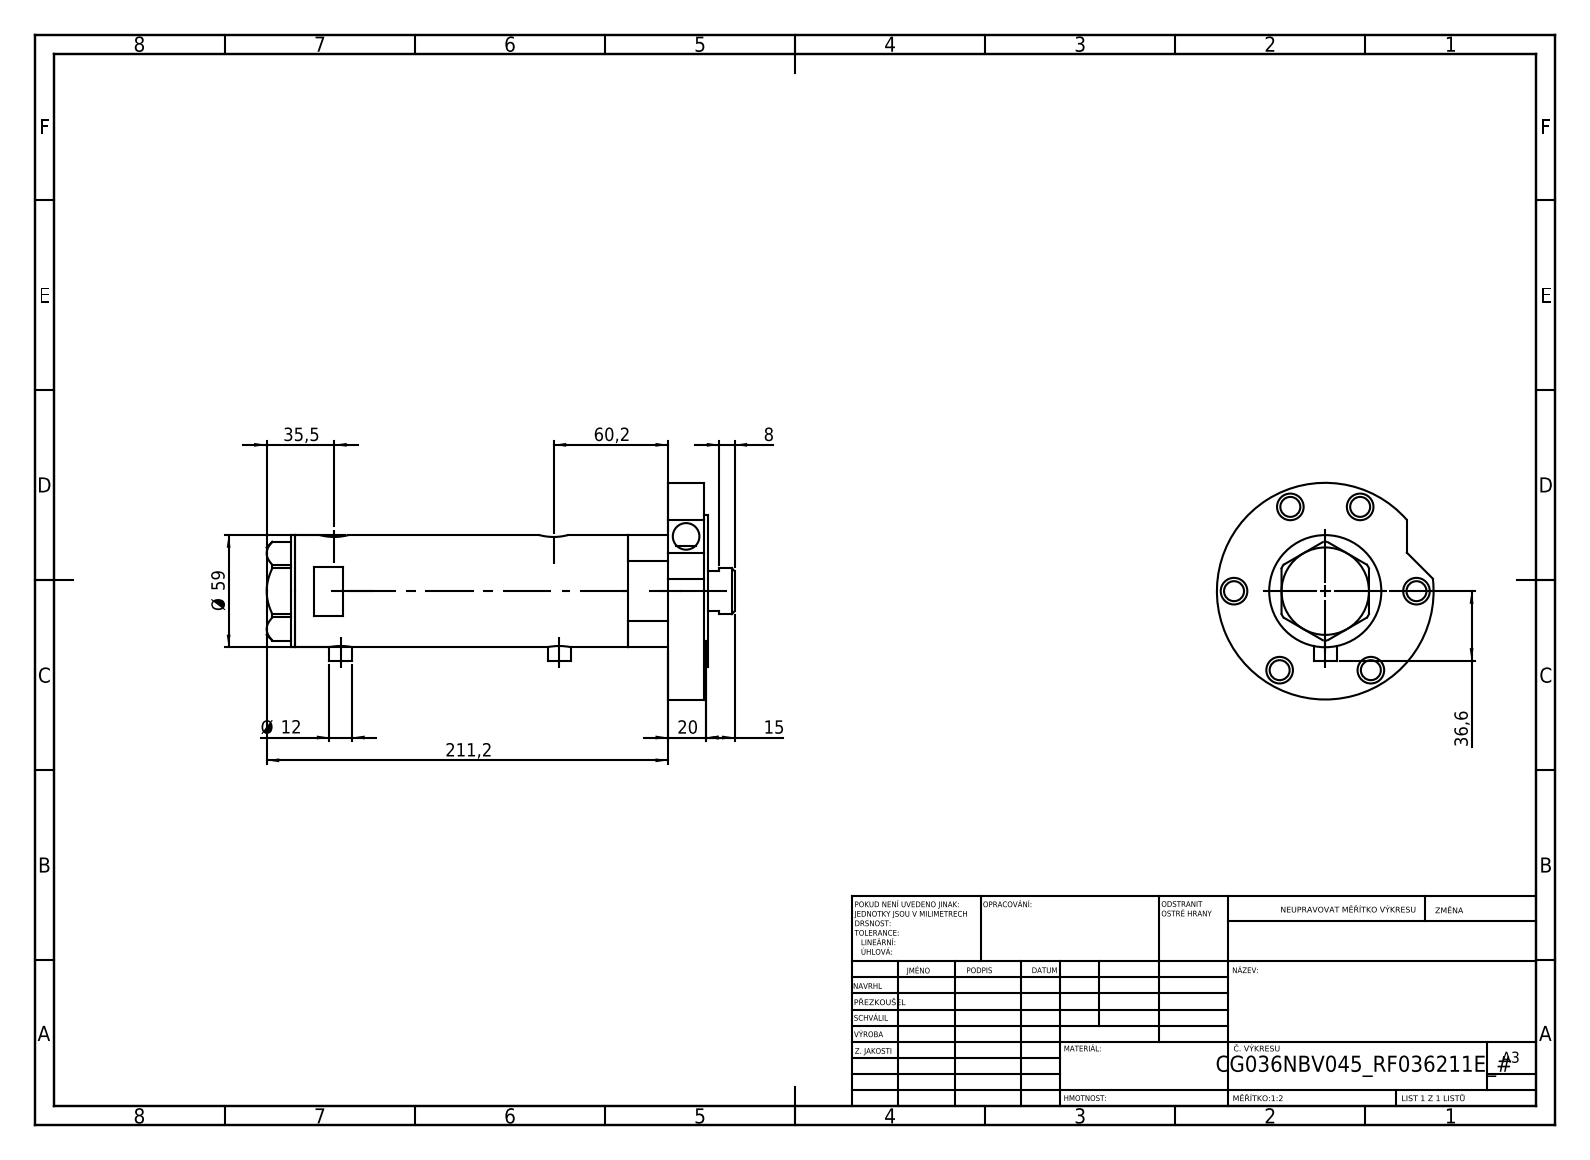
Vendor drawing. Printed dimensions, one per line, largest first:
211,2
60,2
Ø 59
36,6
35,5
20
15
Ø 12
8
